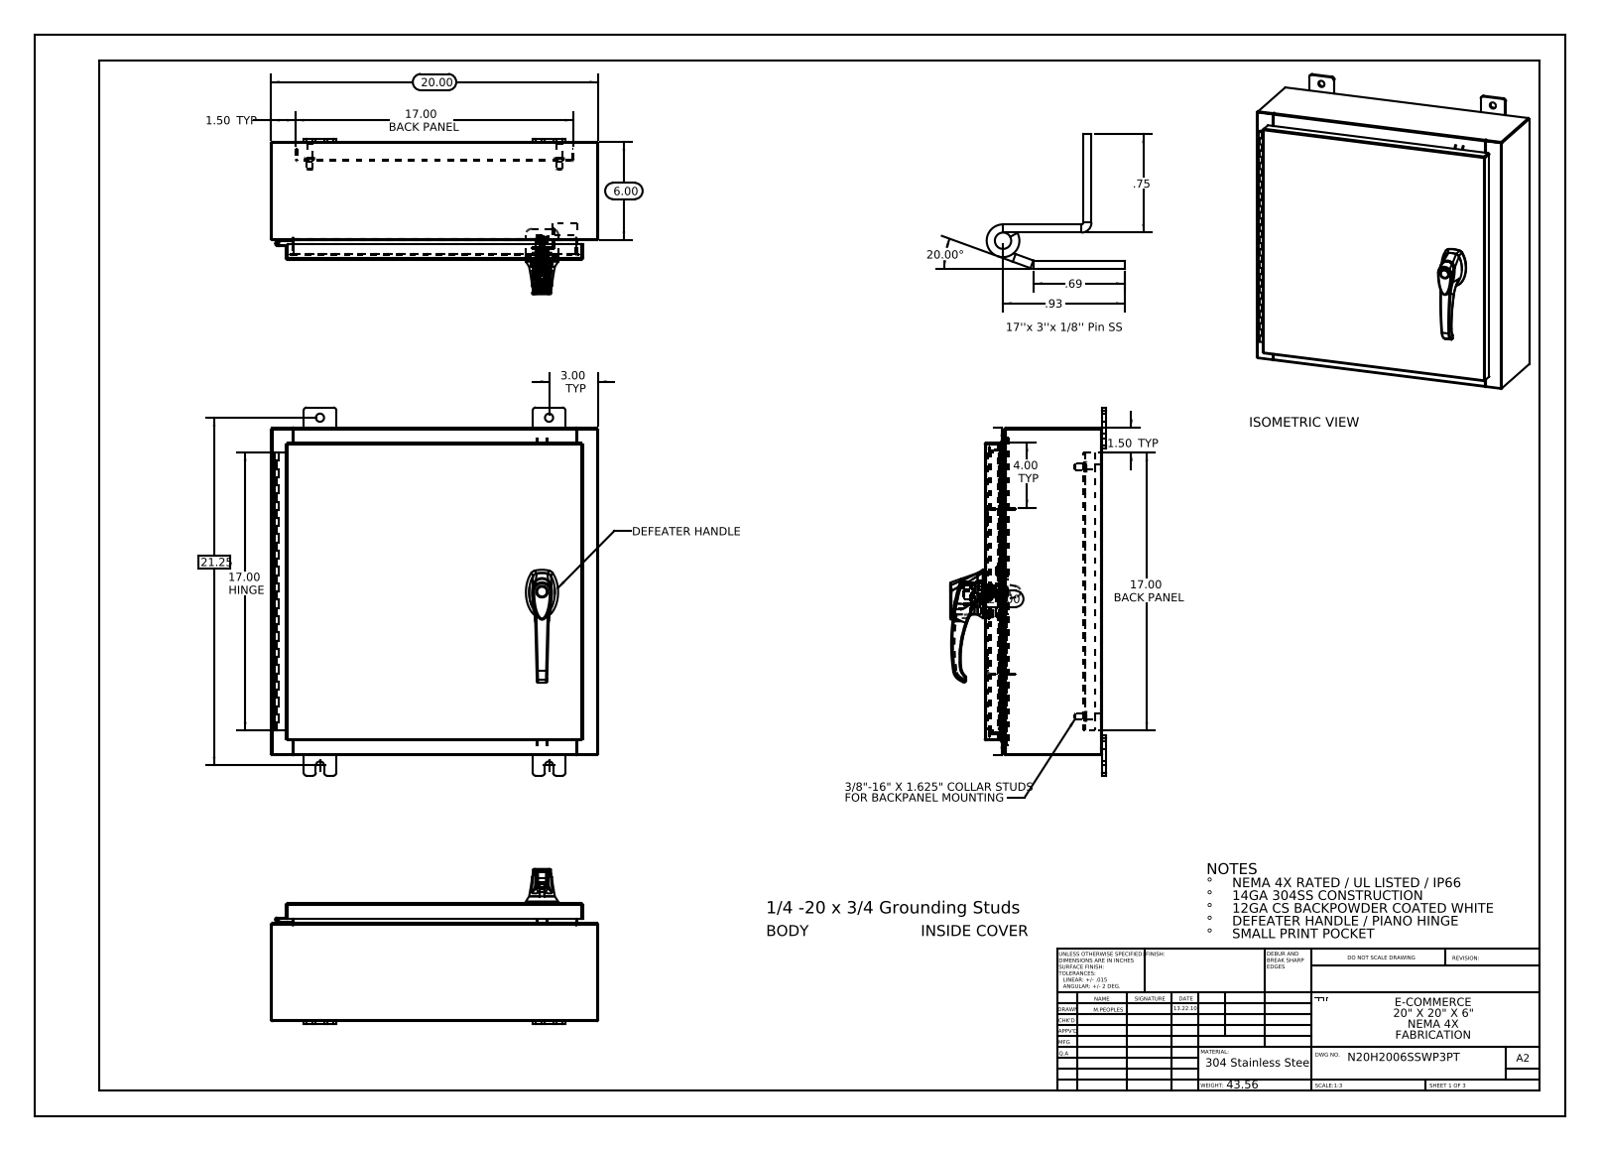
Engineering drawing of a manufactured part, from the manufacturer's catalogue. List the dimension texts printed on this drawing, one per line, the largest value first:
21.25
20.00
20.00
20.00°
17.00 HINGE
17.00 BACK PANEL
17.00 BACK PANEL
6.00
4.00 TYP
3.00 TYP
1.50 TYP
1.50 TYP
.93
.75
.69
